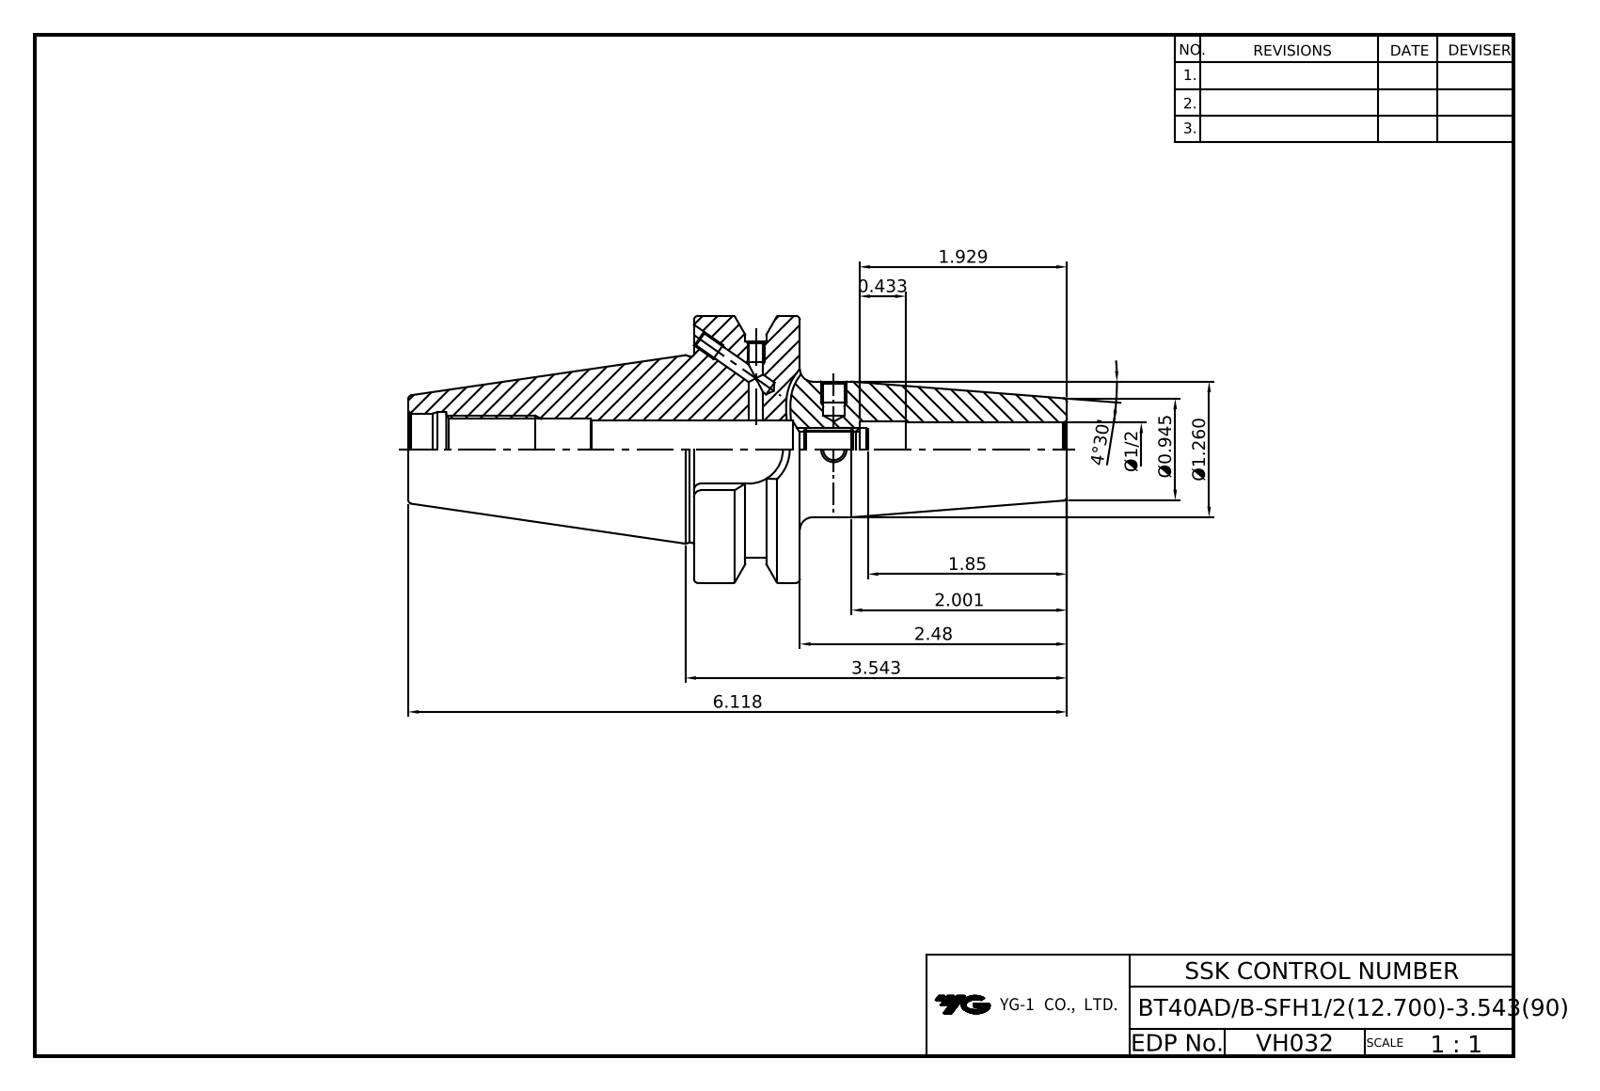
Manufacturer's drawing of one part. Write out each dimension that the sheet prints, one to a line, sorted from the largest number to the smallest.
6.118
4°30'
3.543
2.48
2.001
1.929
1.85
Ø1.260
Ø0.945
0.433
